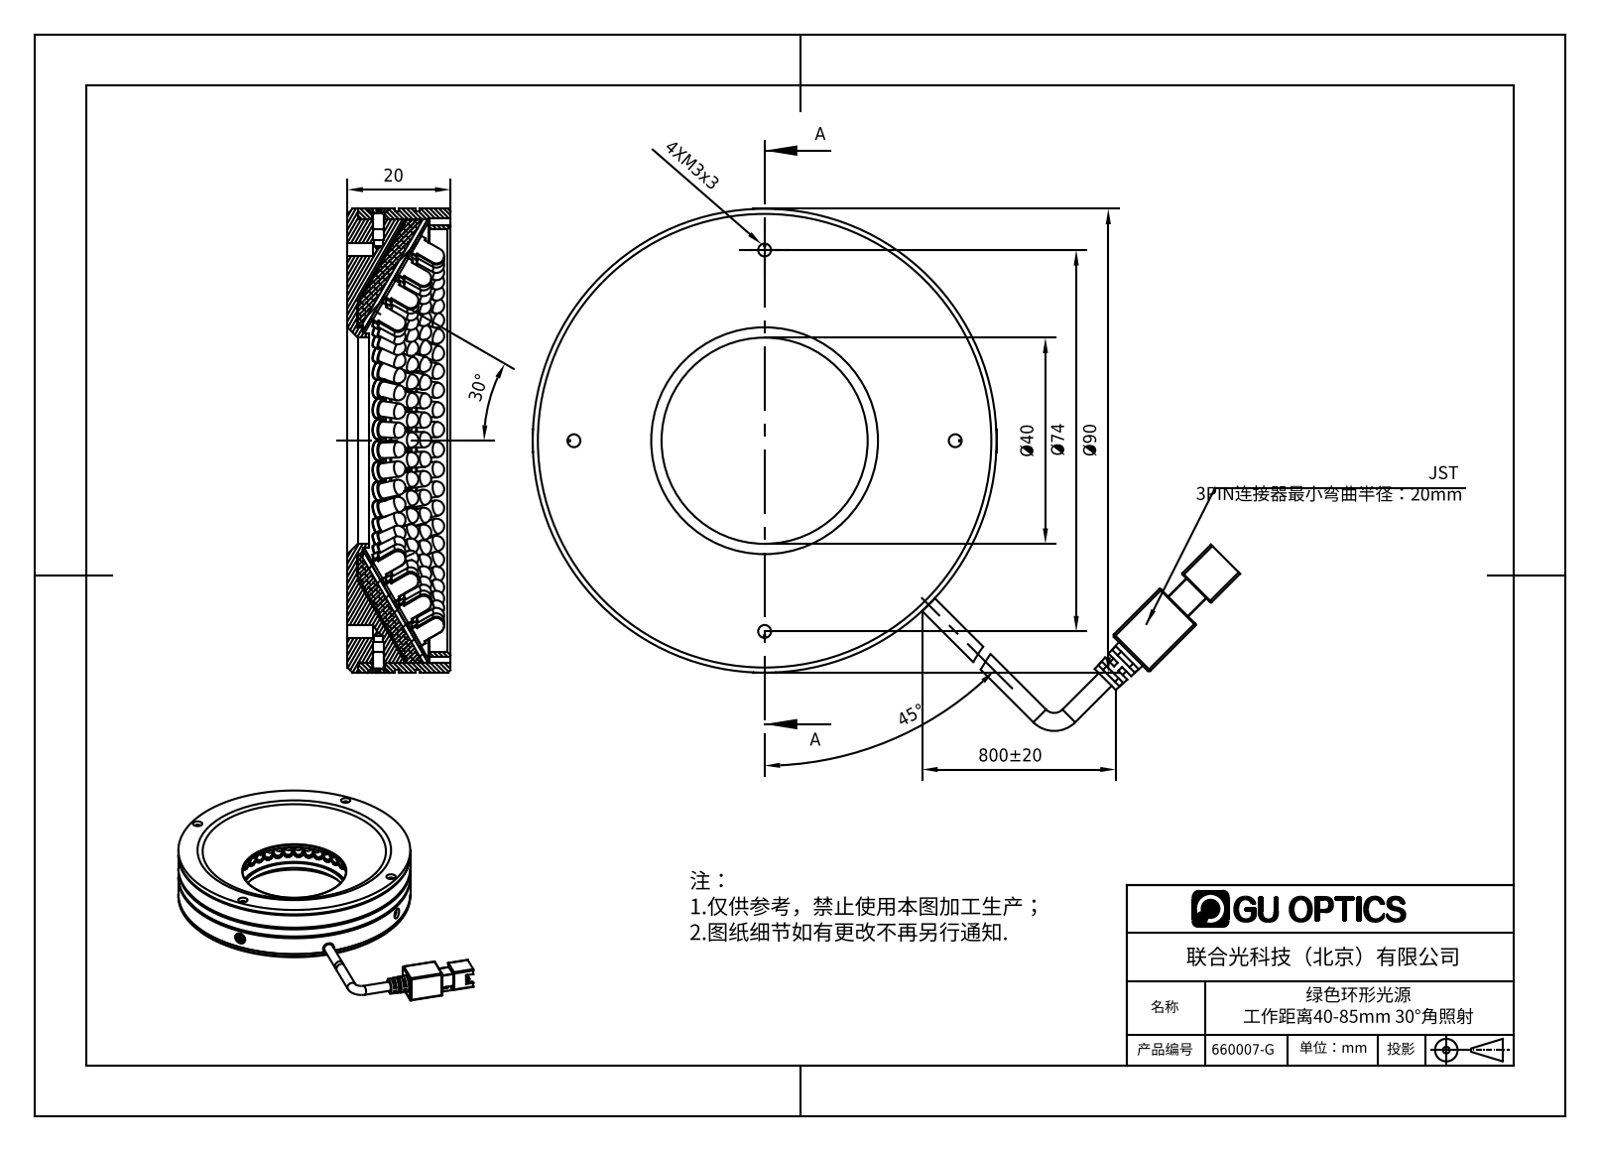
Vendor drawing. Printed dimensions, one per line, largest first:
800±20
Ø90
Ø74
45°
Ø40
30°
20
4XM3x3
